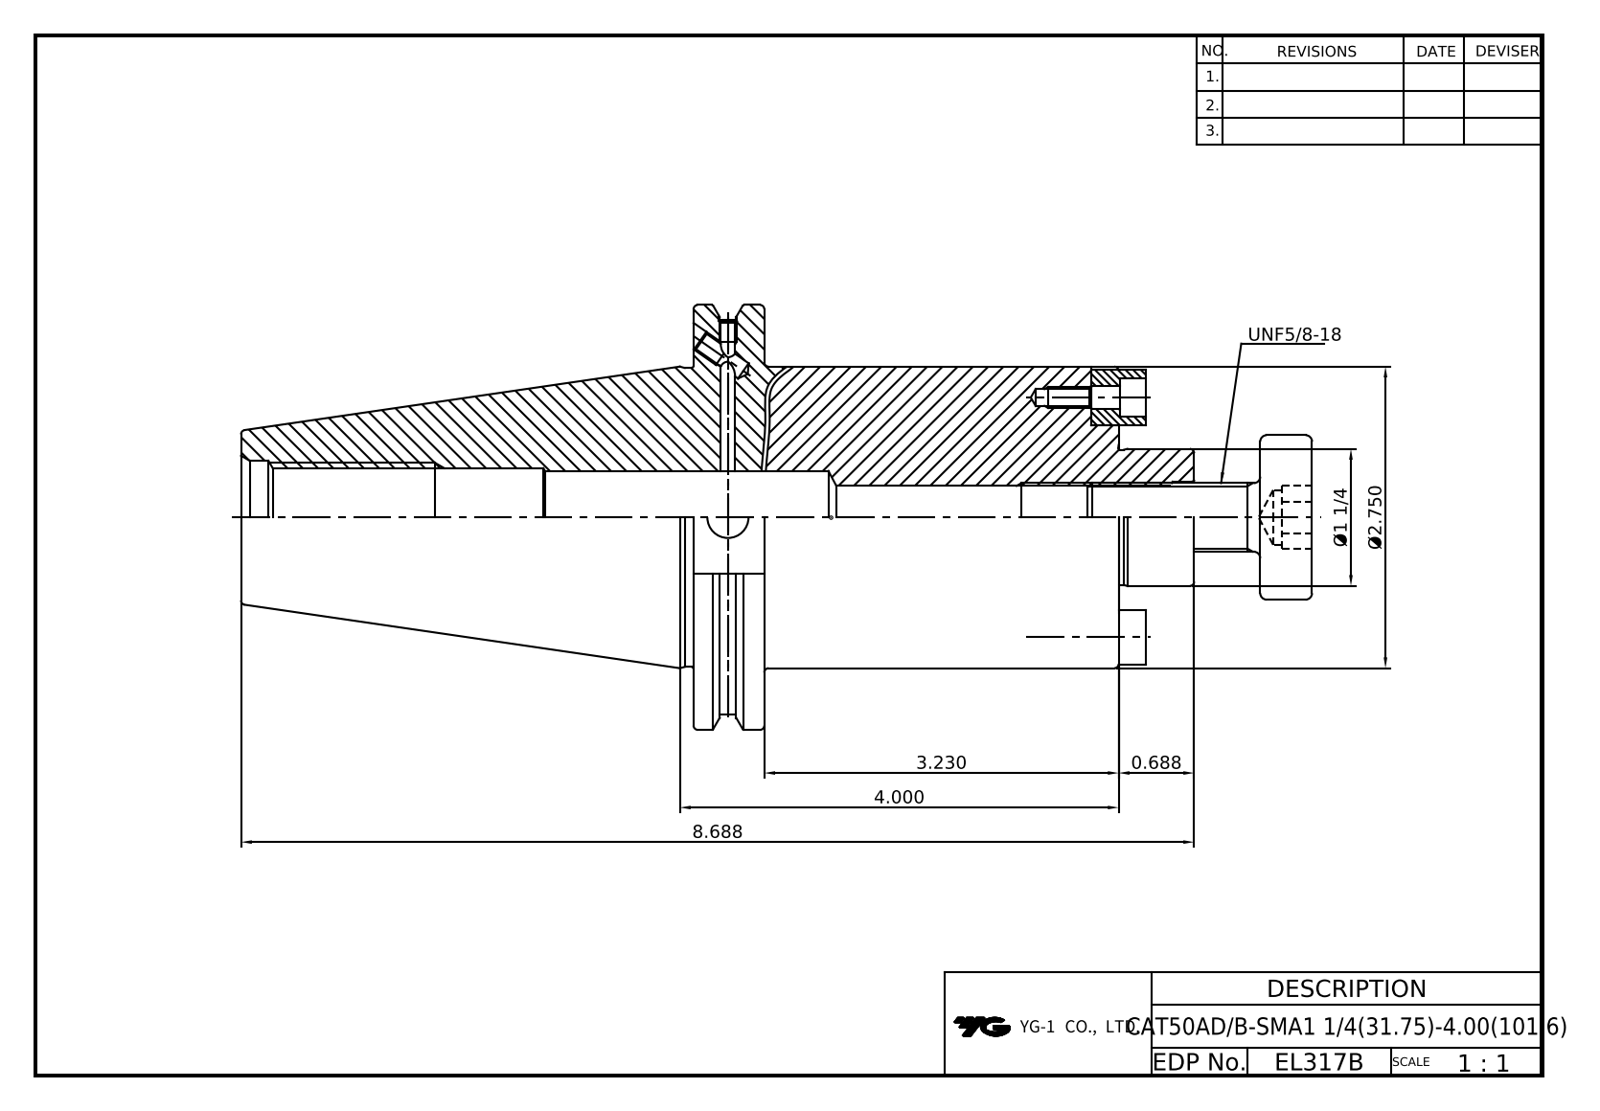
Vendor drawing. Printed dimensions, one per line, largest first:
8.688
4.000
3.230
Ø2.750
Ø1 1/4
0.688
